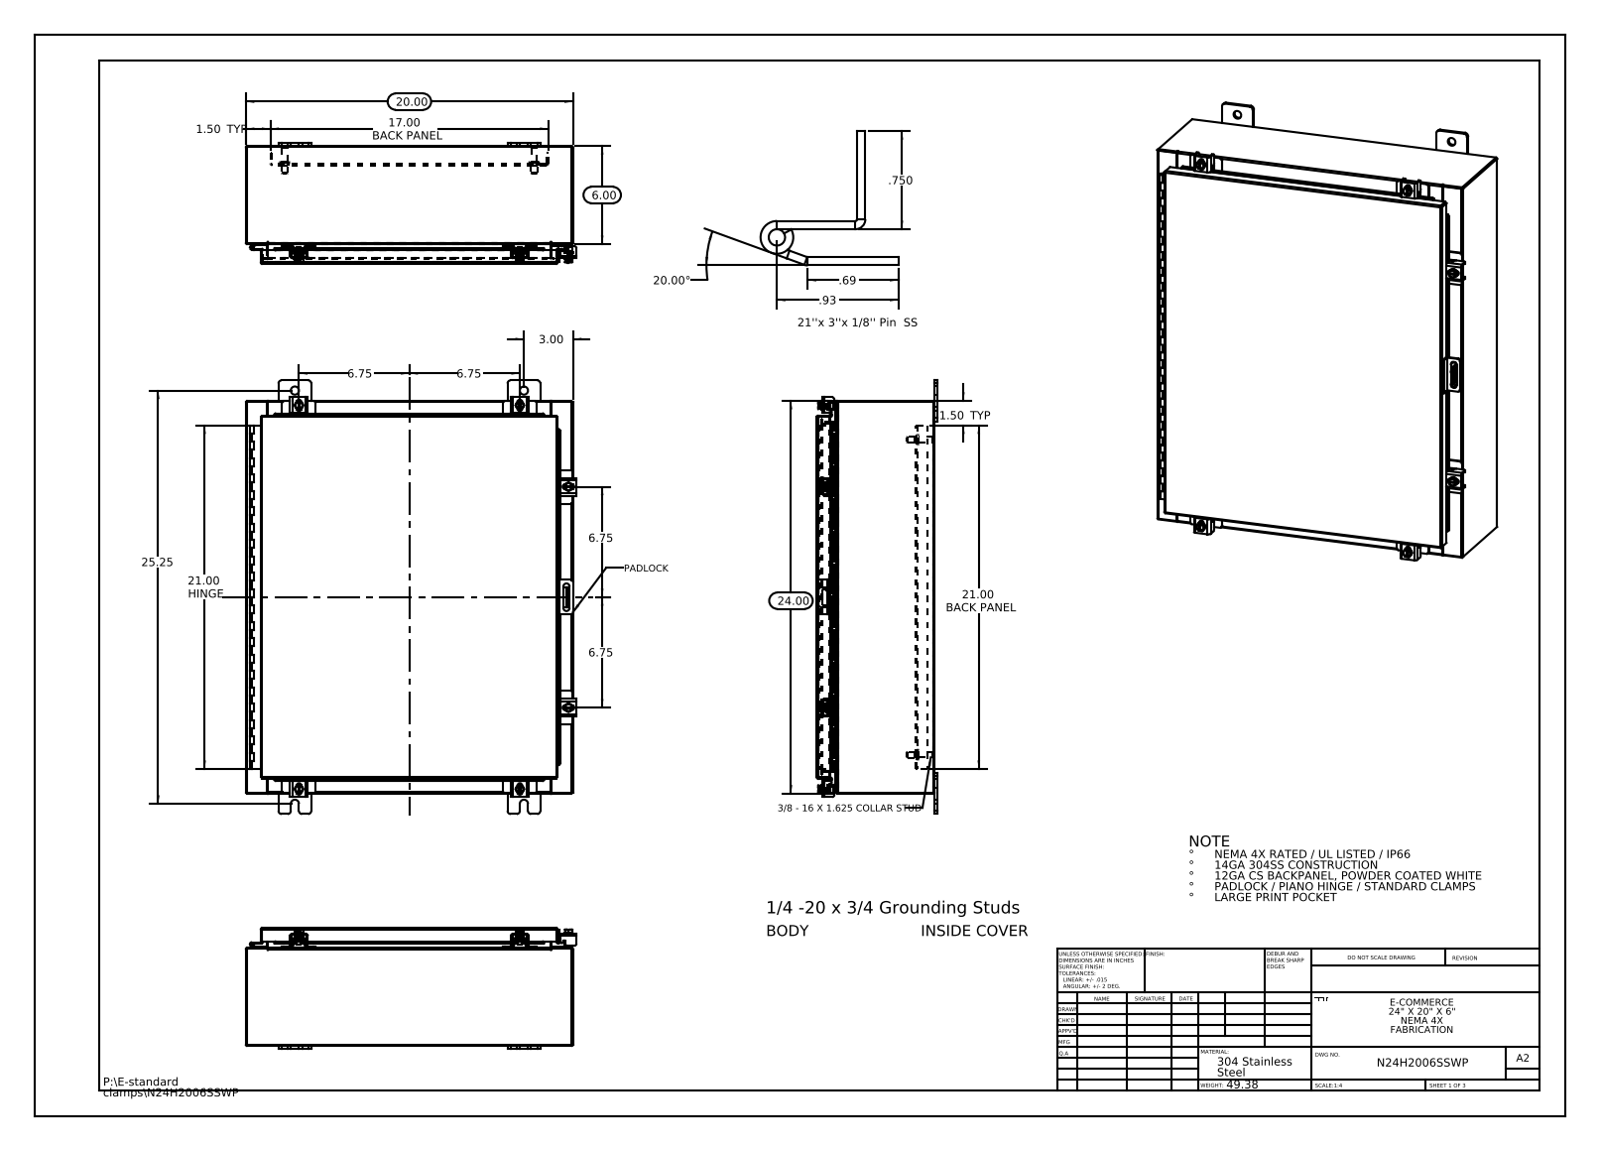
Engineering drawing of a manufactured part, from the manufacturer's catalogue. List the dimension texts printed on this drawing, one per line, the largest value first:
25.25
24.00
21.00 HINGE
21.00 BACK PANEL
20.00
20.00°
17.00 BACK PANEL
6.75
6.75
6.75
6.75
6.00
3.00
1.50 TYP
1.50 TYP
.93
.750
.69
